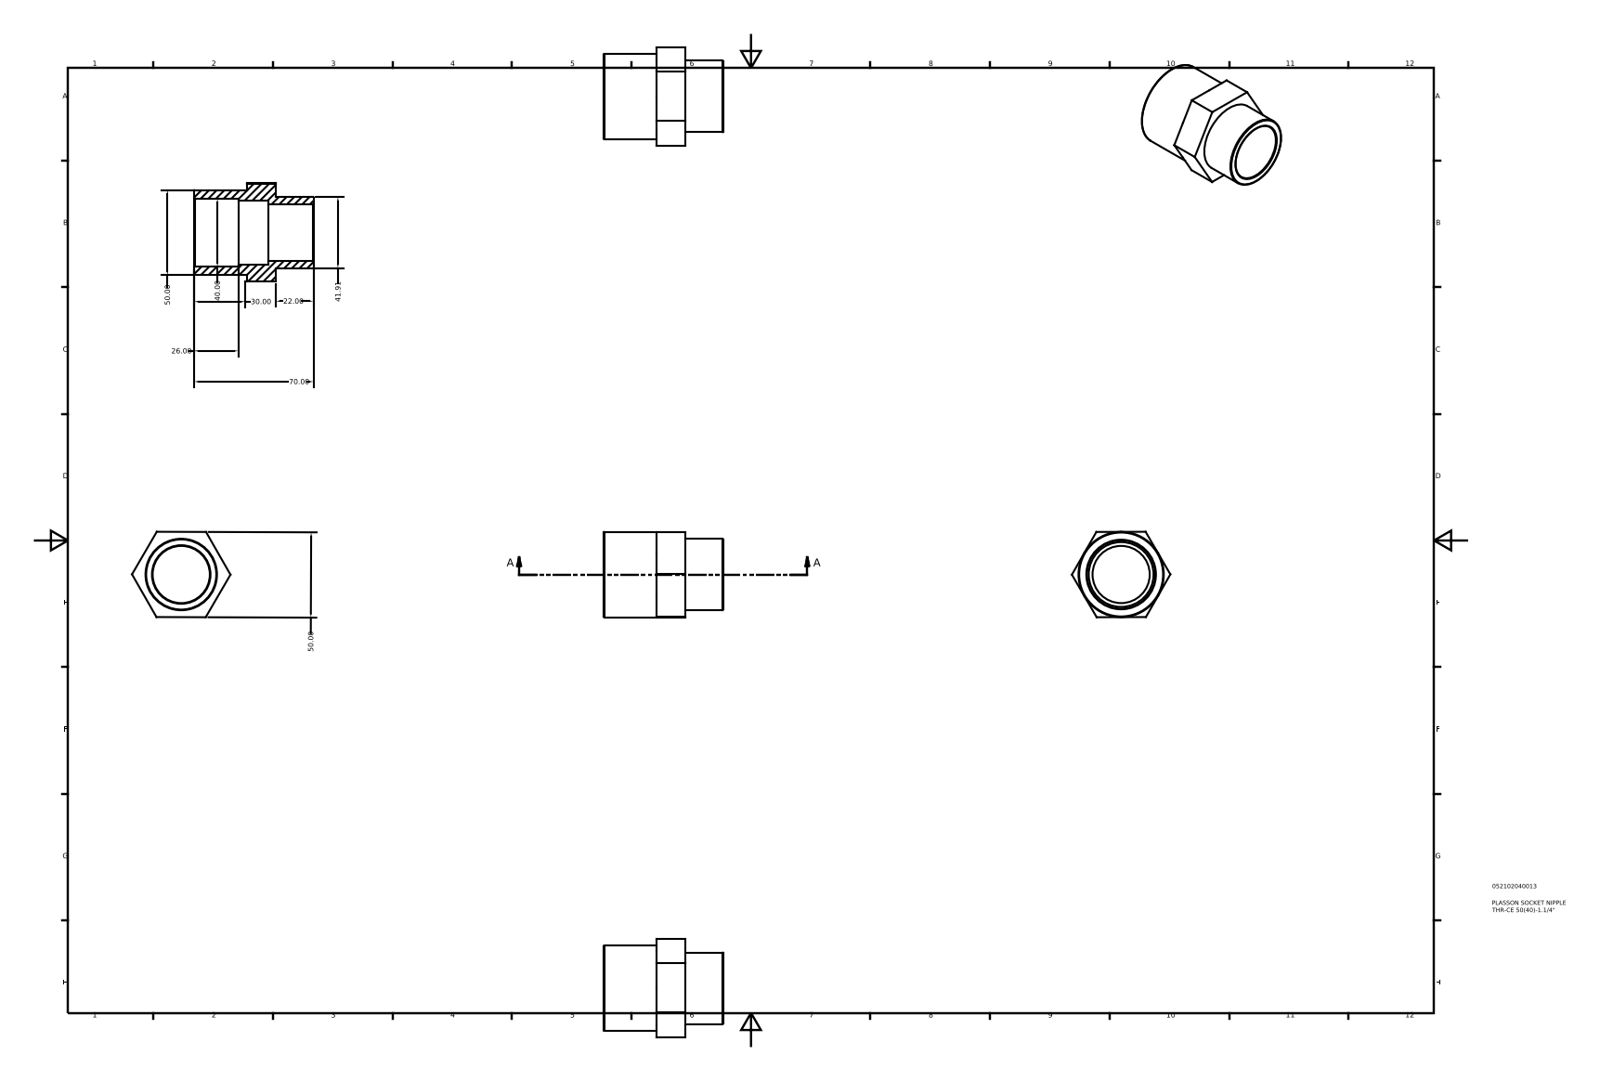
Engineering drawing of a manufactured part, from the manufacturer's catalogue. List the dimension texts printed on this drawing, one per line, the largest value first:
70.00
50.00
50.00
41.91
40.00
30.00
26.00
22.00
